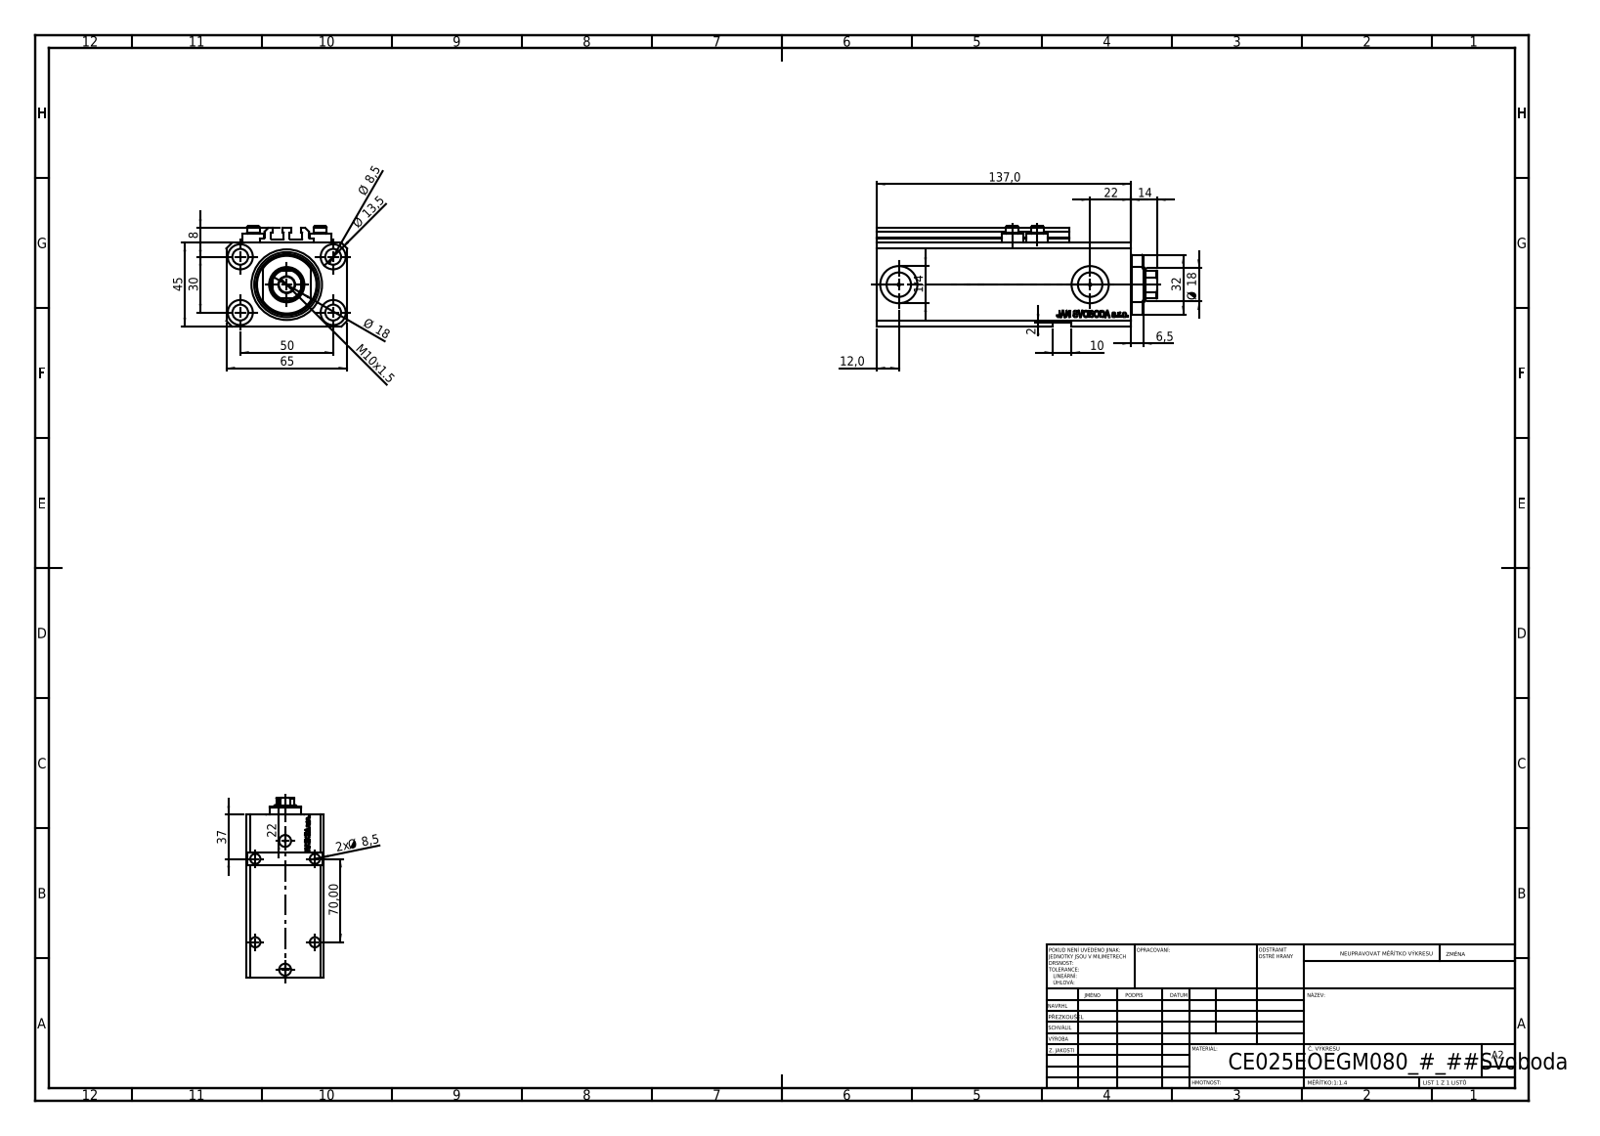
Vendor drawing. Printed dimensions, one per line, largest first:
137,0
70,00
65
50
45
37
32
30
22
22
Ø 18
Ø 18
14
Ø 13,5
12,0
M10x1.5
10
Ø 8,5
2x Ø 8,5
8
6,5
2
1/4
